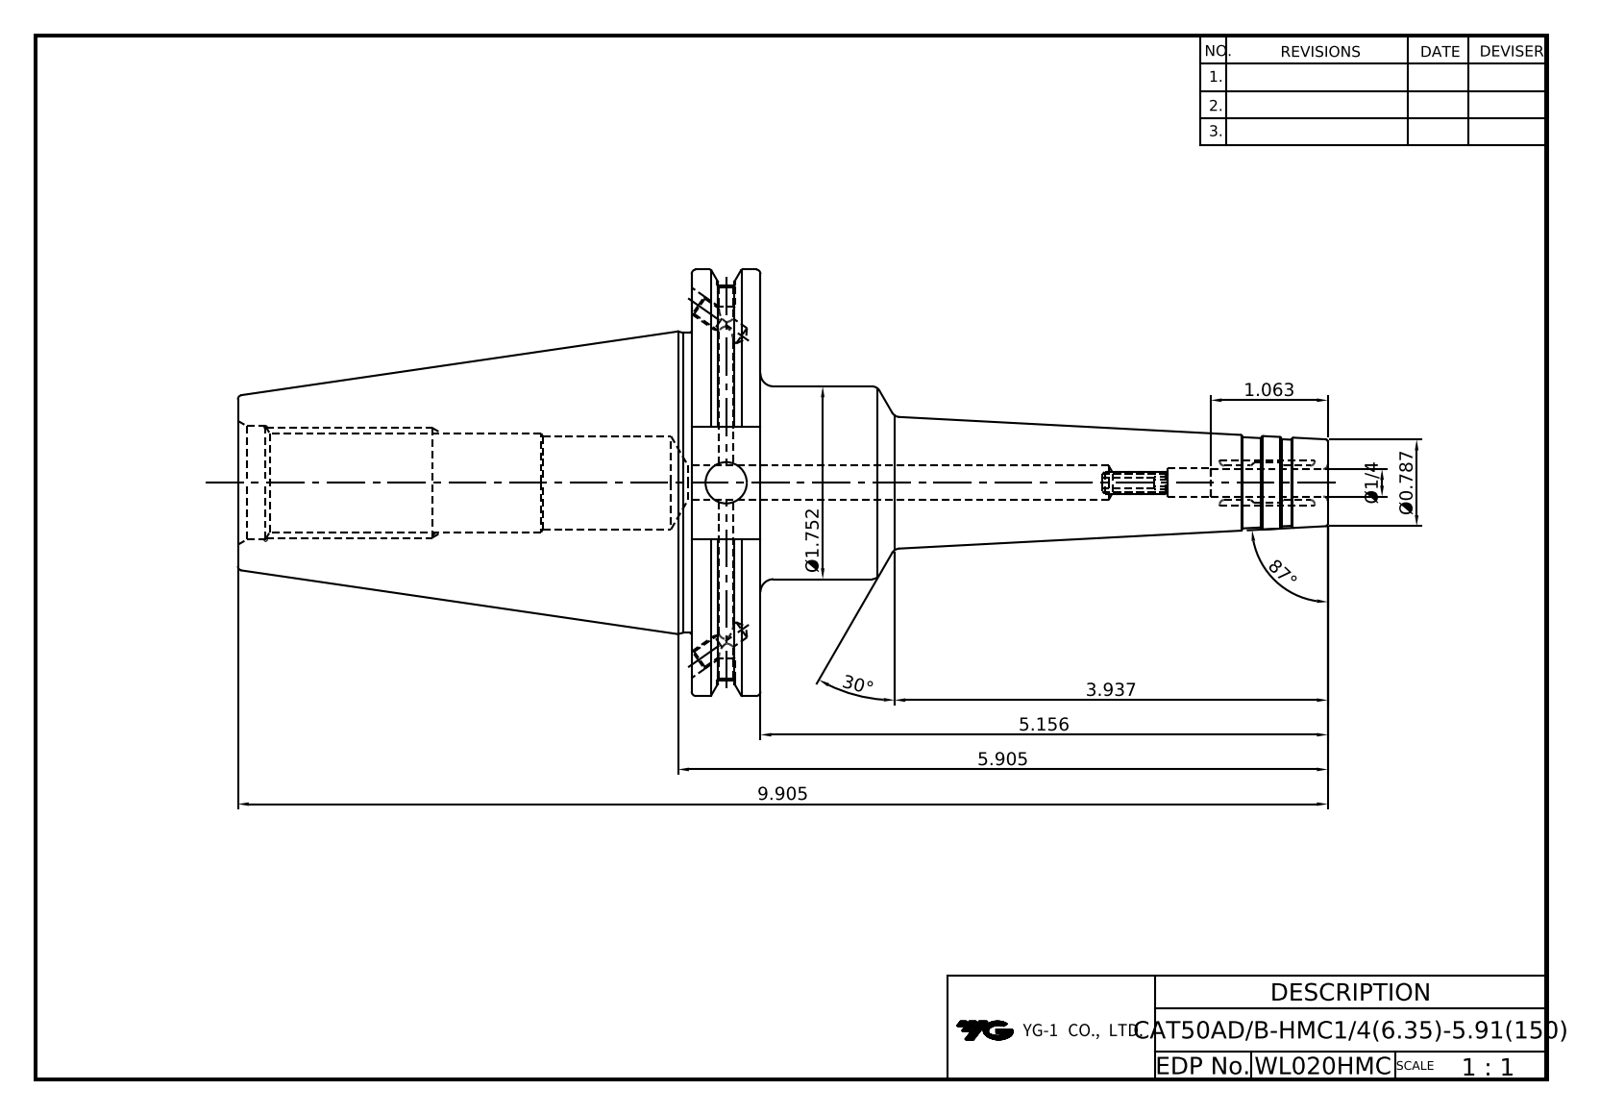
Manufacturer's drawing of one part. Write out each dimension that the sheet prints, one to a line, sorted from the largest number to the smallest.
87°
30°
9.905
5.905
5.156
3.937
Ø1.752
1.063
Ø0.787
Ø1/4
